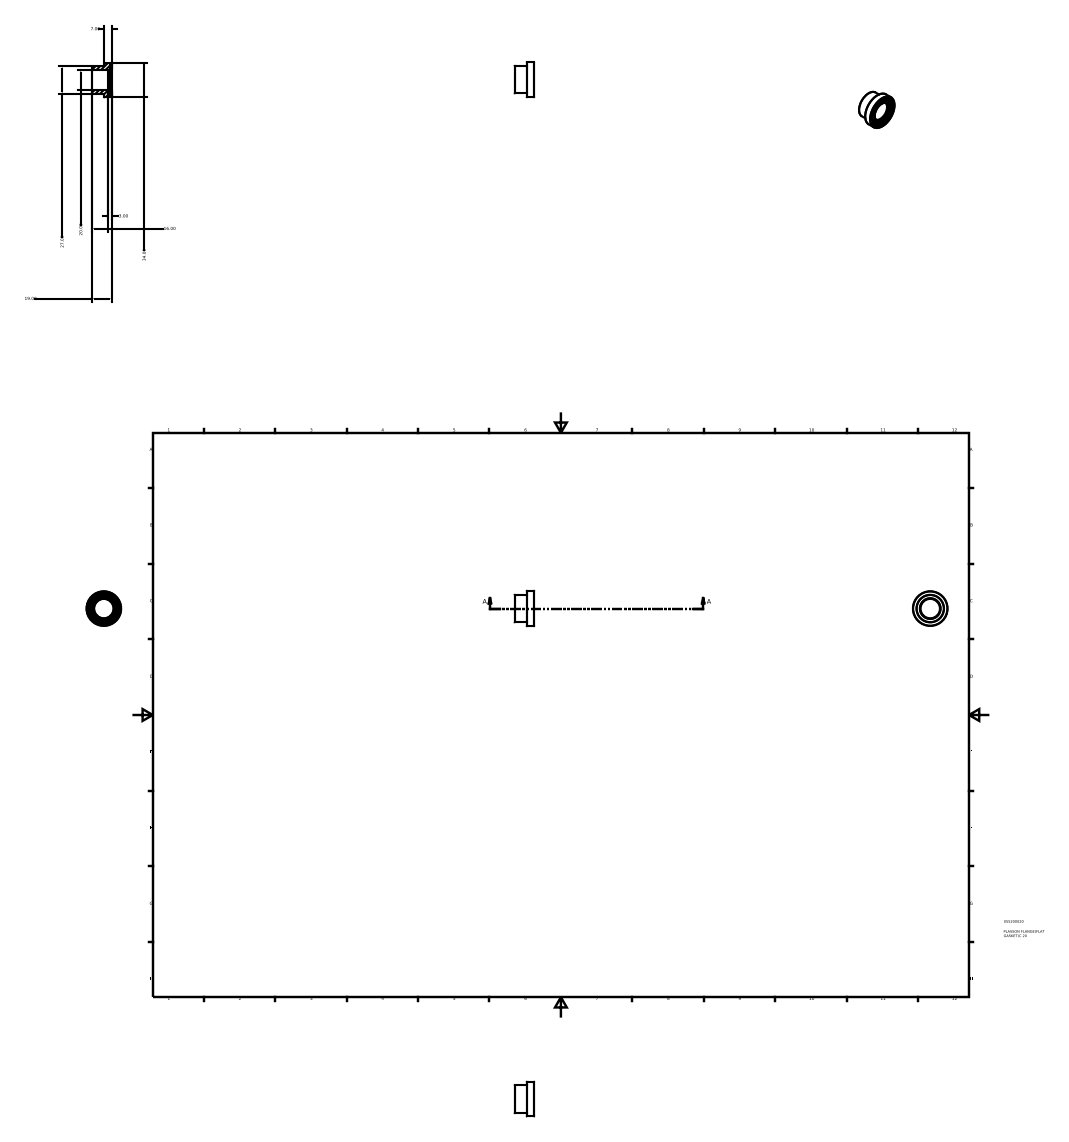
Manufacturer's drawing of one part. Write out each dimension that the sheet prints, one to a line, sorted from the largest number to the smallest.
34.00
27.00
20.00
19.00
16.00
7.00
3.00
